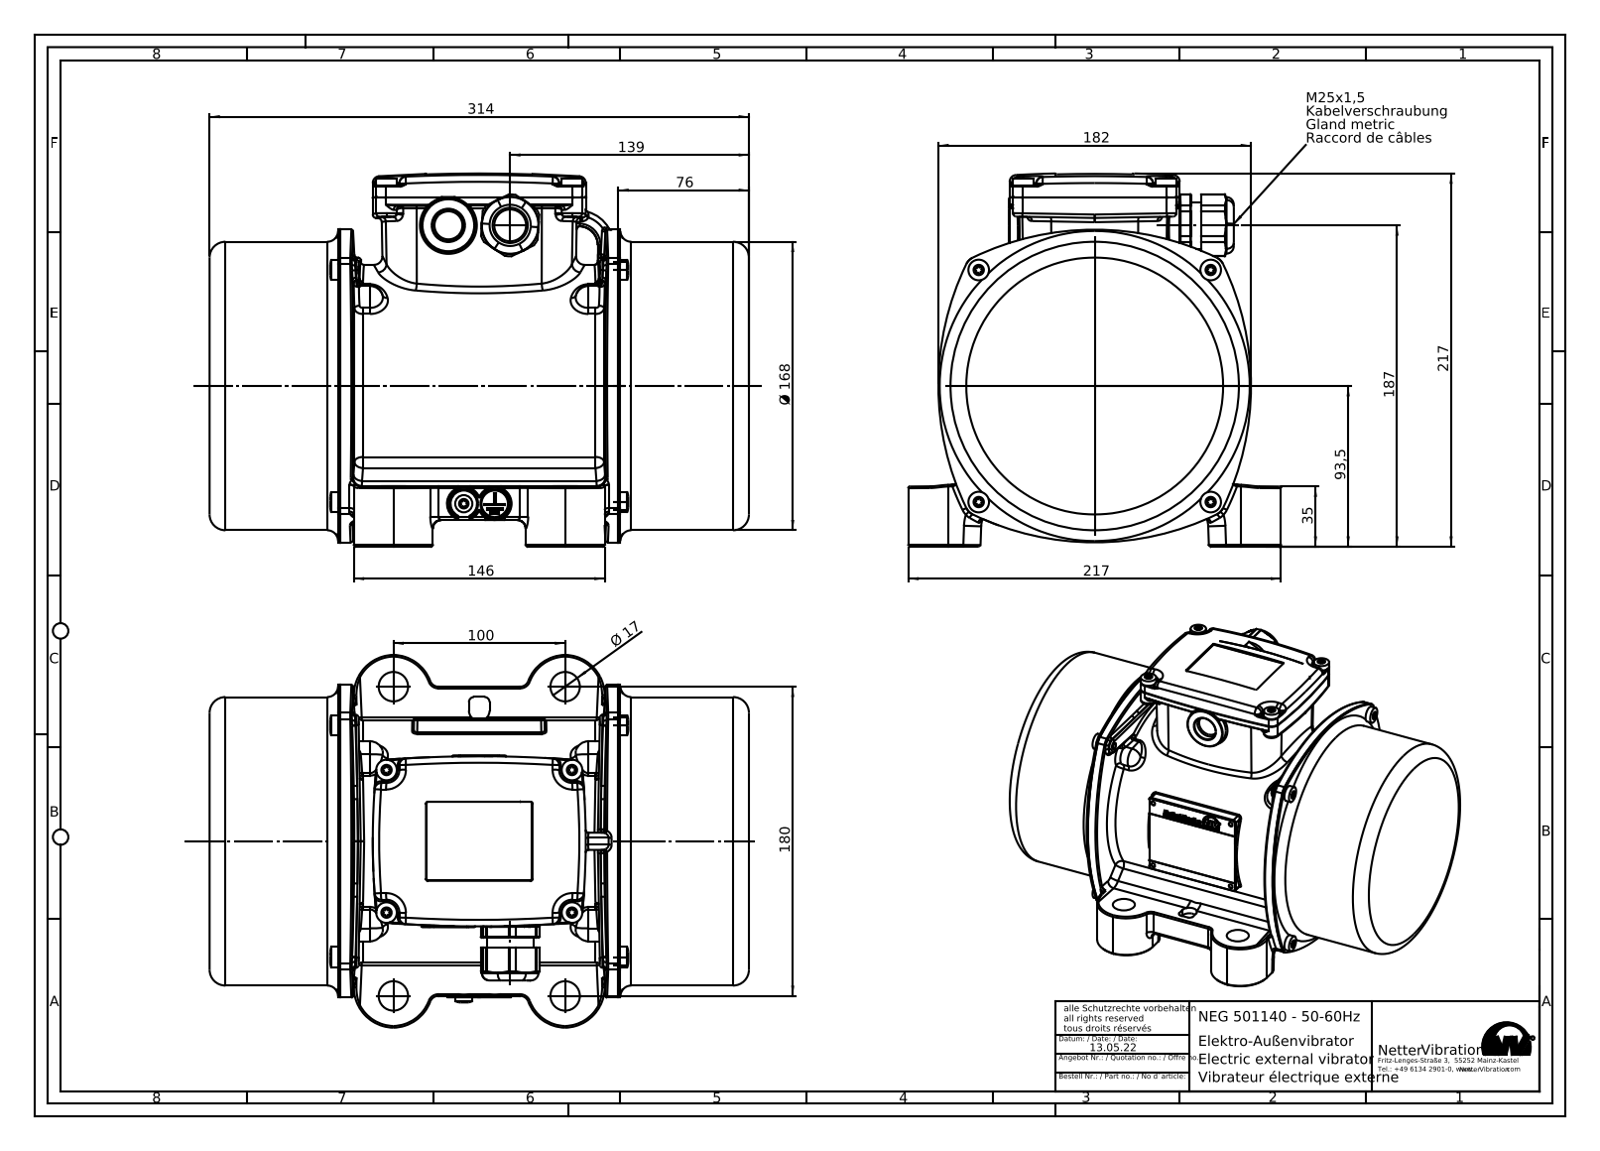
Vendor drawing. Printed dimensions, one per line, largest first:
314
217
217
187
182
180
Ø 168
146
139
100
93,5
76
35
Ø 17
